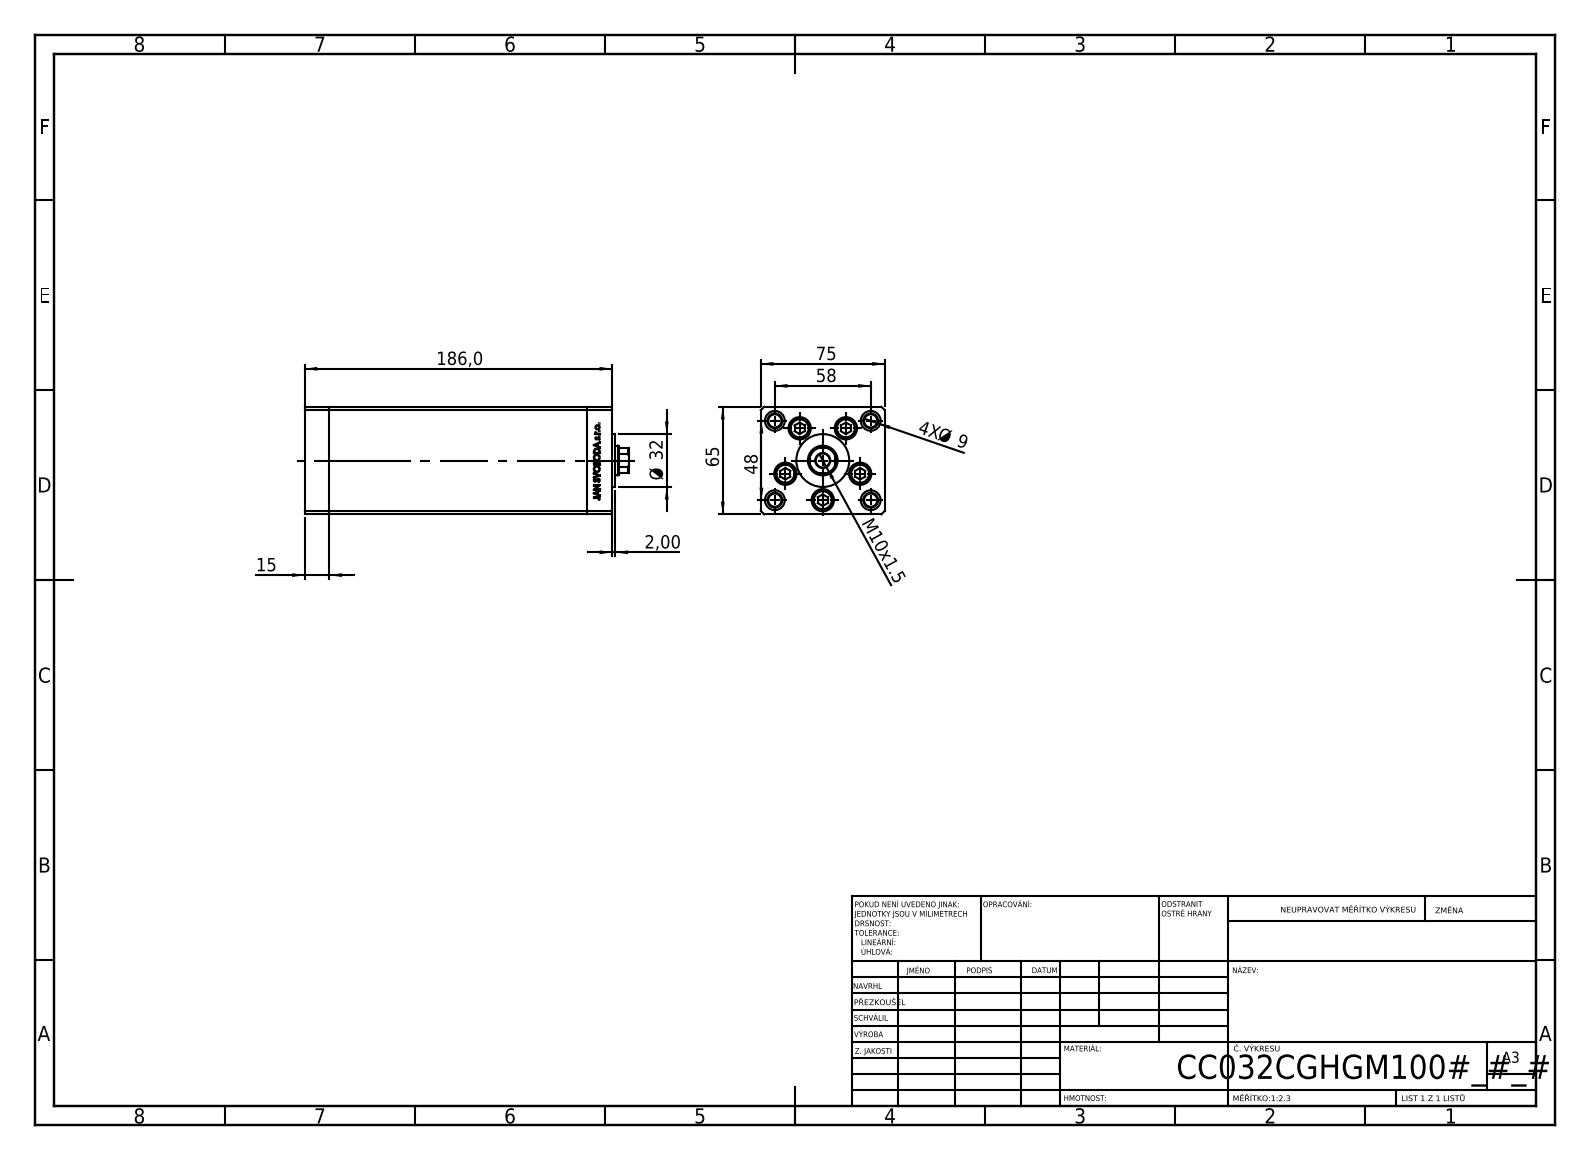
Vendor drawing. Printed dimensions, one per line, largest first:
186,0
75
65
58
48
Ø 32
15
M10x1.5
4X Ø 9
2,00
